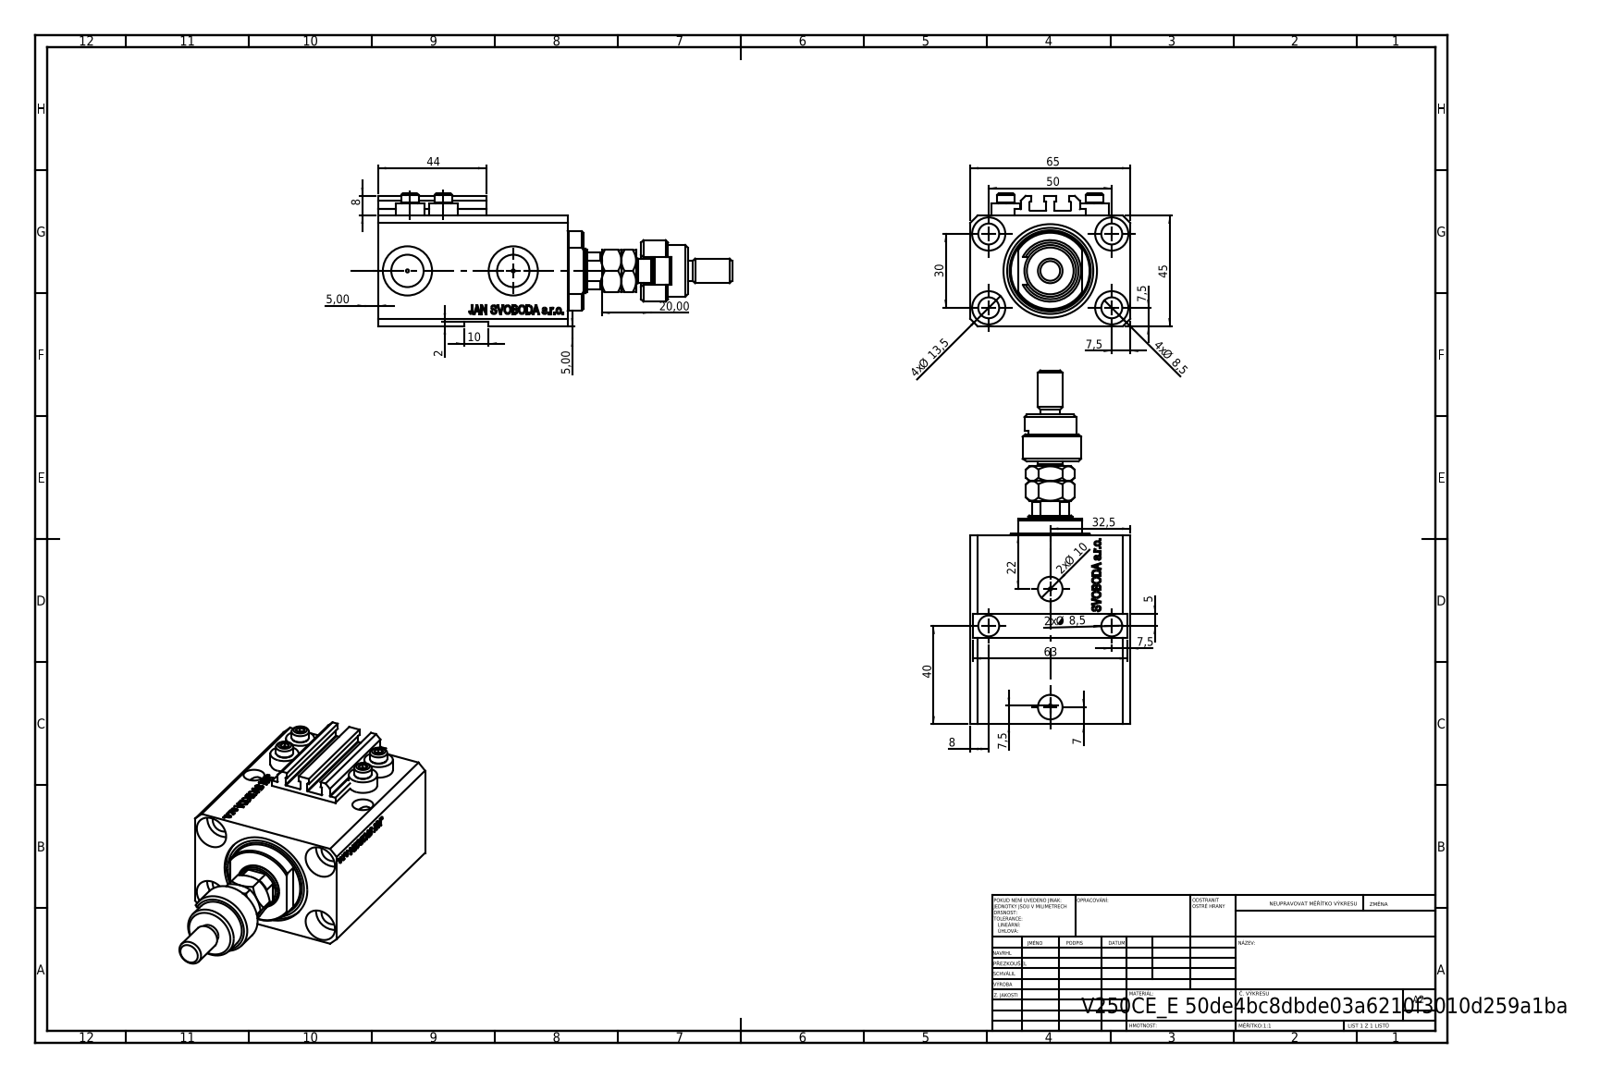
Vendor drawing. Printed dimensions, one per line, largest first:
65
63
50
45
44
40
32,5
30
22
20,00
4x Ø 13,5
10
2x Ø 10
4x Ø 8,5
2x Ø 8,5
8
8
7,5
7,5
7,5
7,5
7
5,00
5,00
5
2
